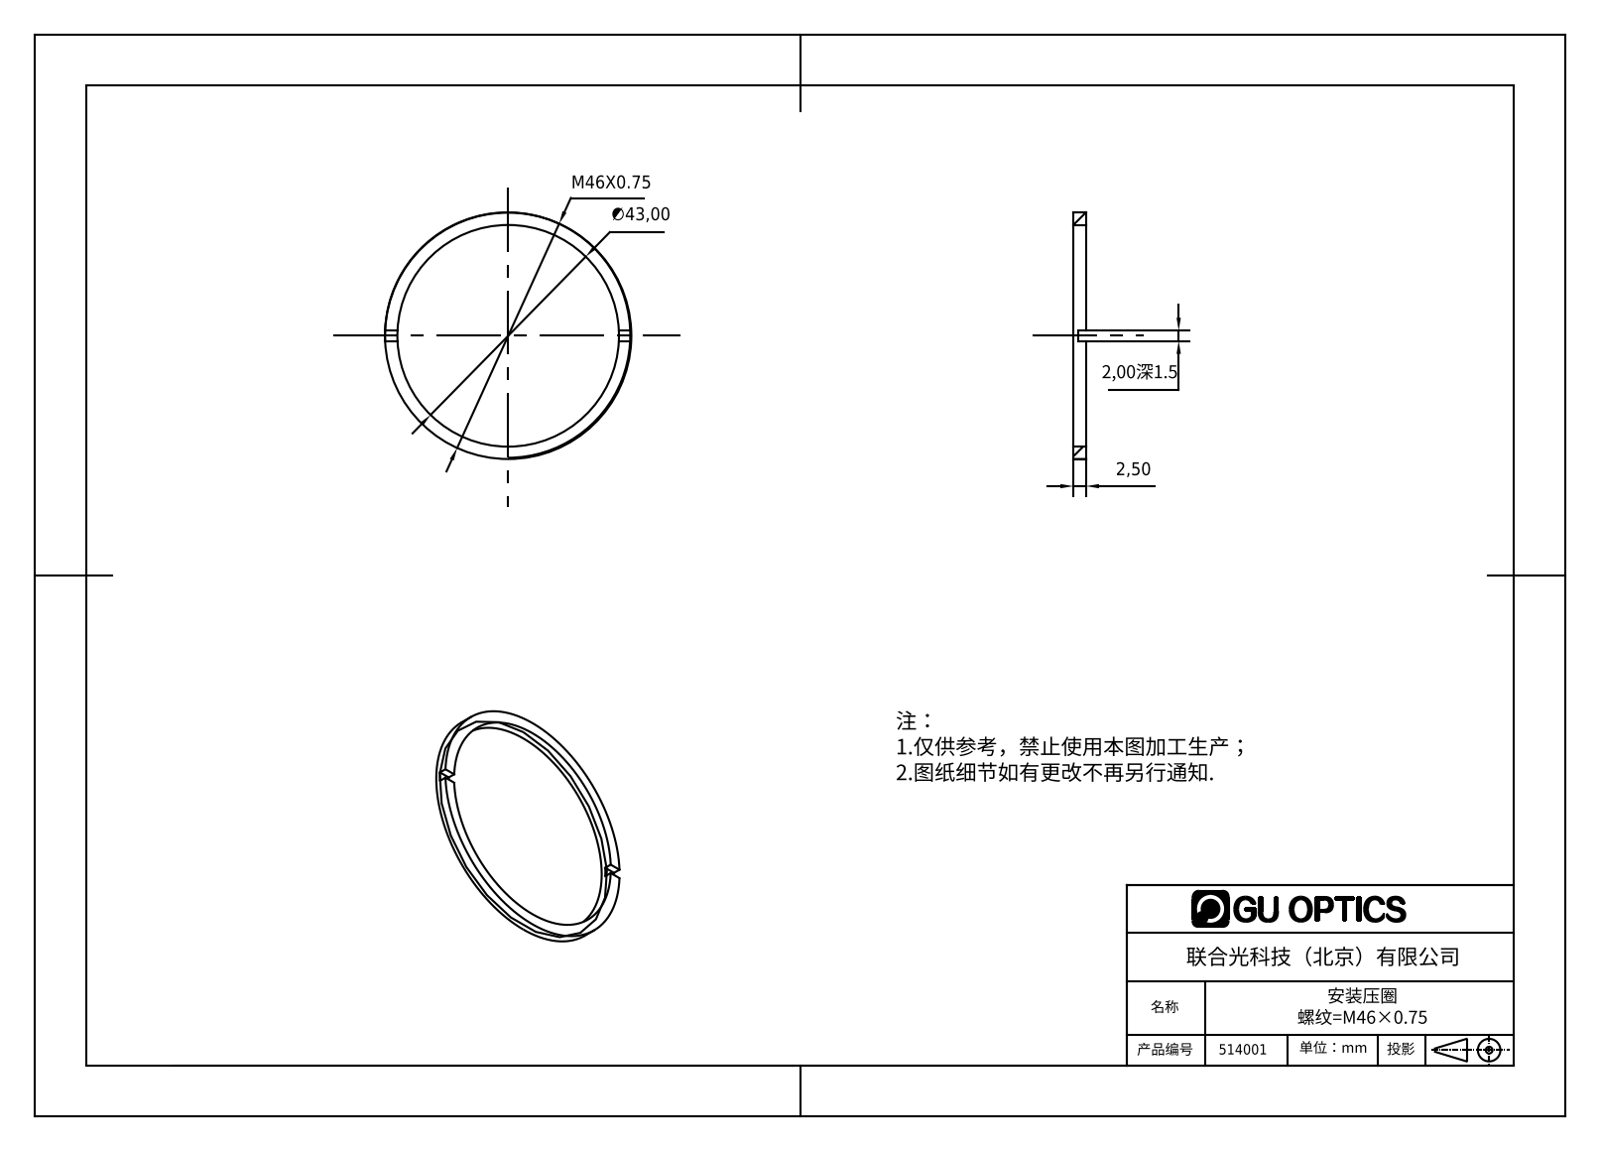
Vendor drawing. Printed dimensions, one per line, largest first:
M46X0.75
∅43,00
2,50
2,00深1.5
